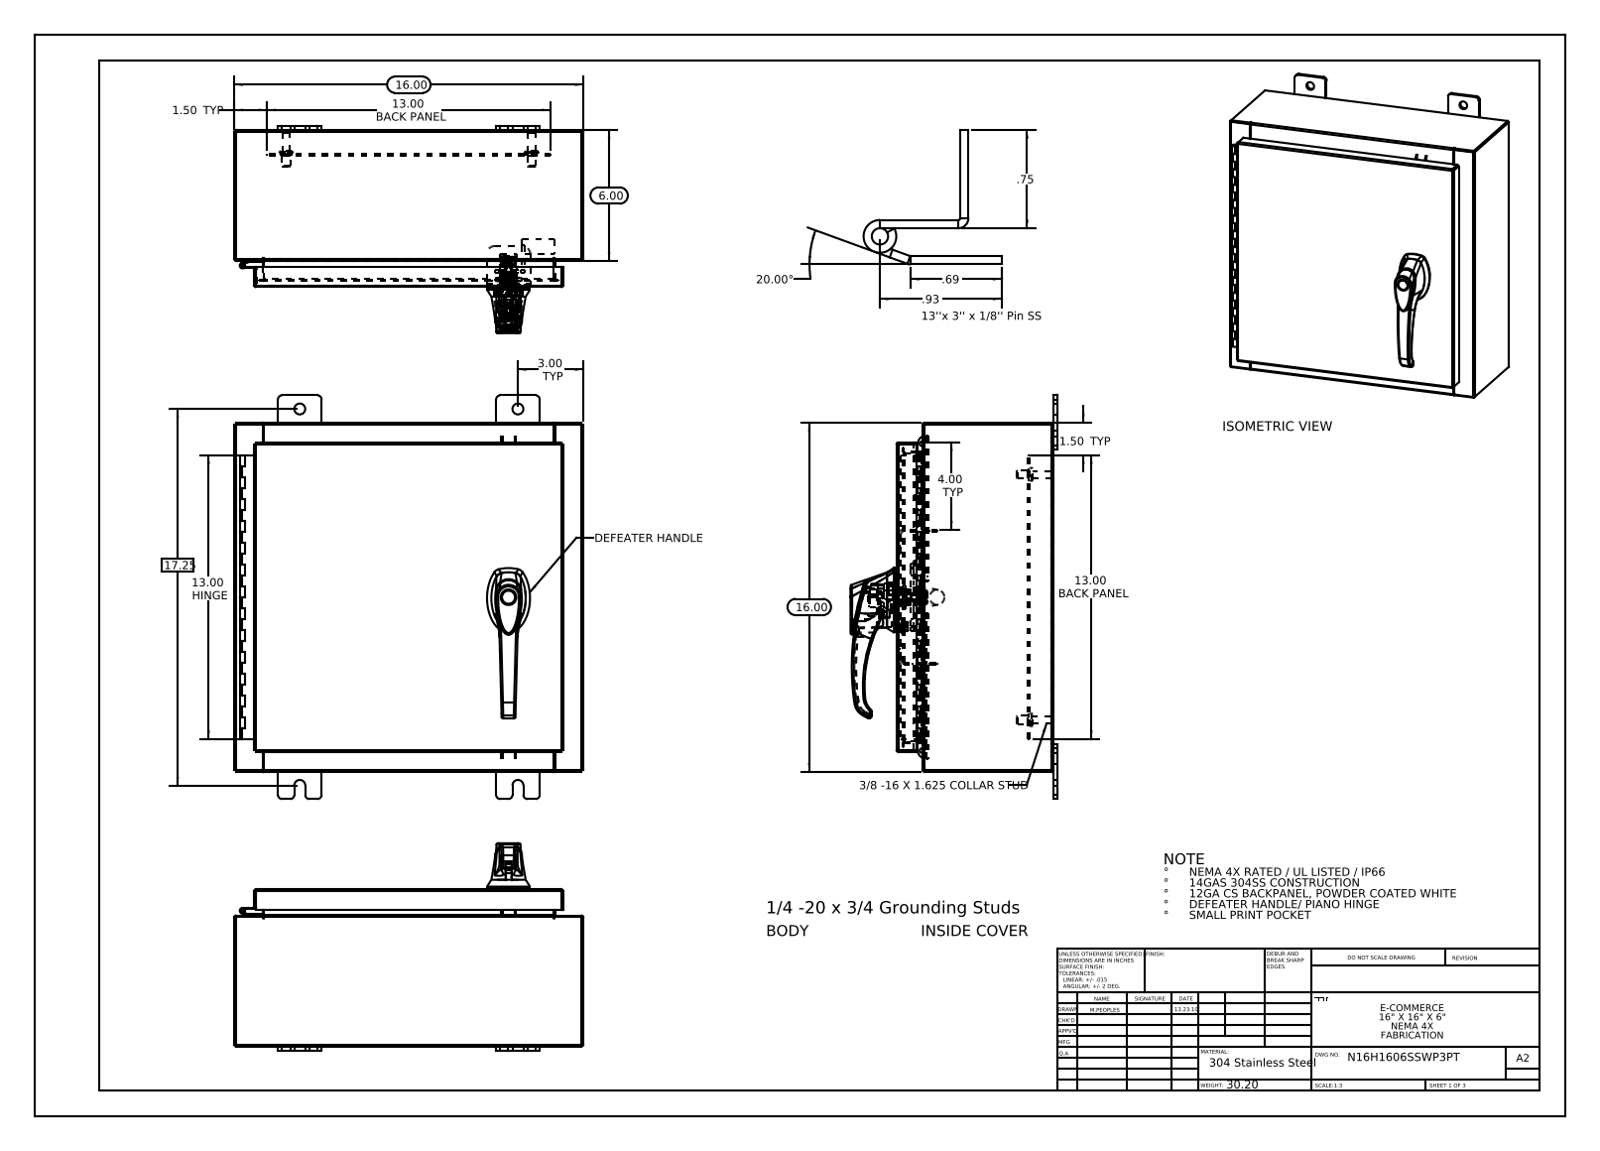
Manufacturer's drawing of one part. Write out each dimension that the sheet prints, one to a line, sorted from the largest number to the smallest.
20.00°
17.25
16.00
16.00
13.00 HINGE
13.00 BACK PANEL
13.00 BACK PANEL
6.00
4.00 TYP
3.00 TYP
1.50 TYP
1.50 TYP
.93
.75
.69
